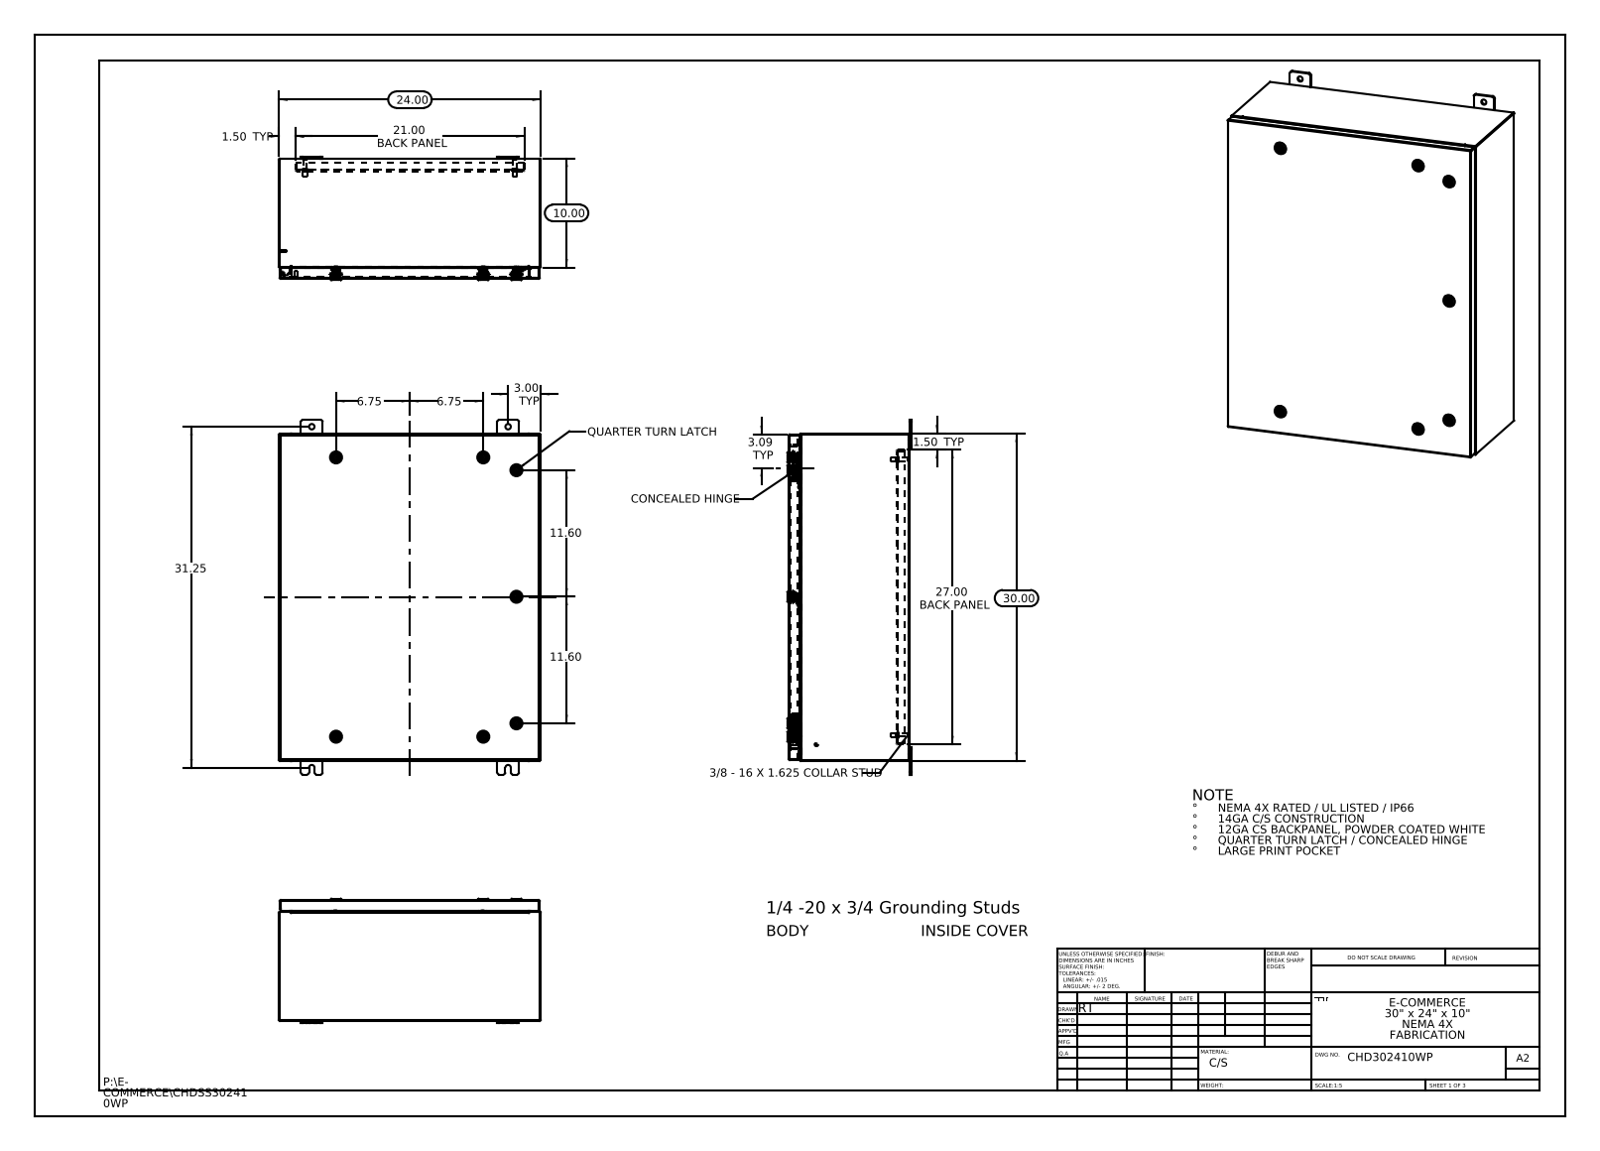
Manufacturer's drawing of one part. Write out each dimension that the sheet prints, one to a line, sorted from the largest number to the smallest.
31.25
30.00
27.00 BACK PANEL
24.00
21.00 BACK PANEL
11.60
11.60
10.00
6.75
6.75
3.09 TYP
3.00 TYP
1.50 TYP
1.50 TYP
